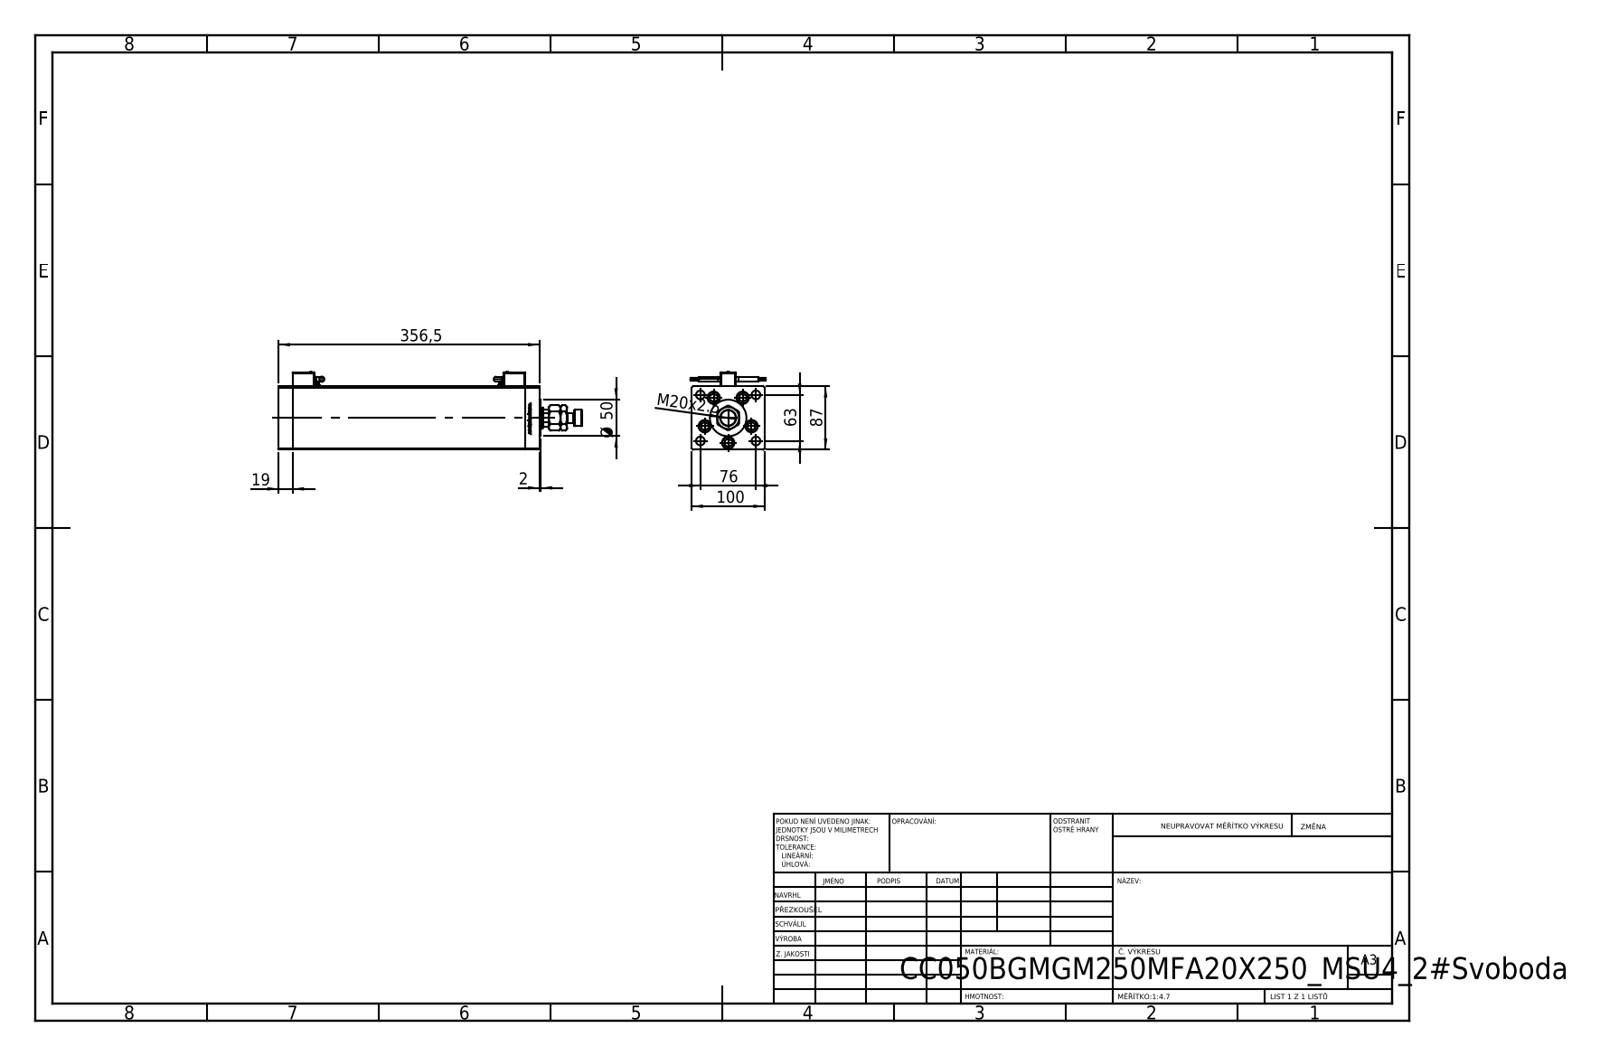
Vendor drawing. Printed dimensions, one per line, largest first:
356,5
100
87
76
63
Ø 50
M20x2.5
19
2
